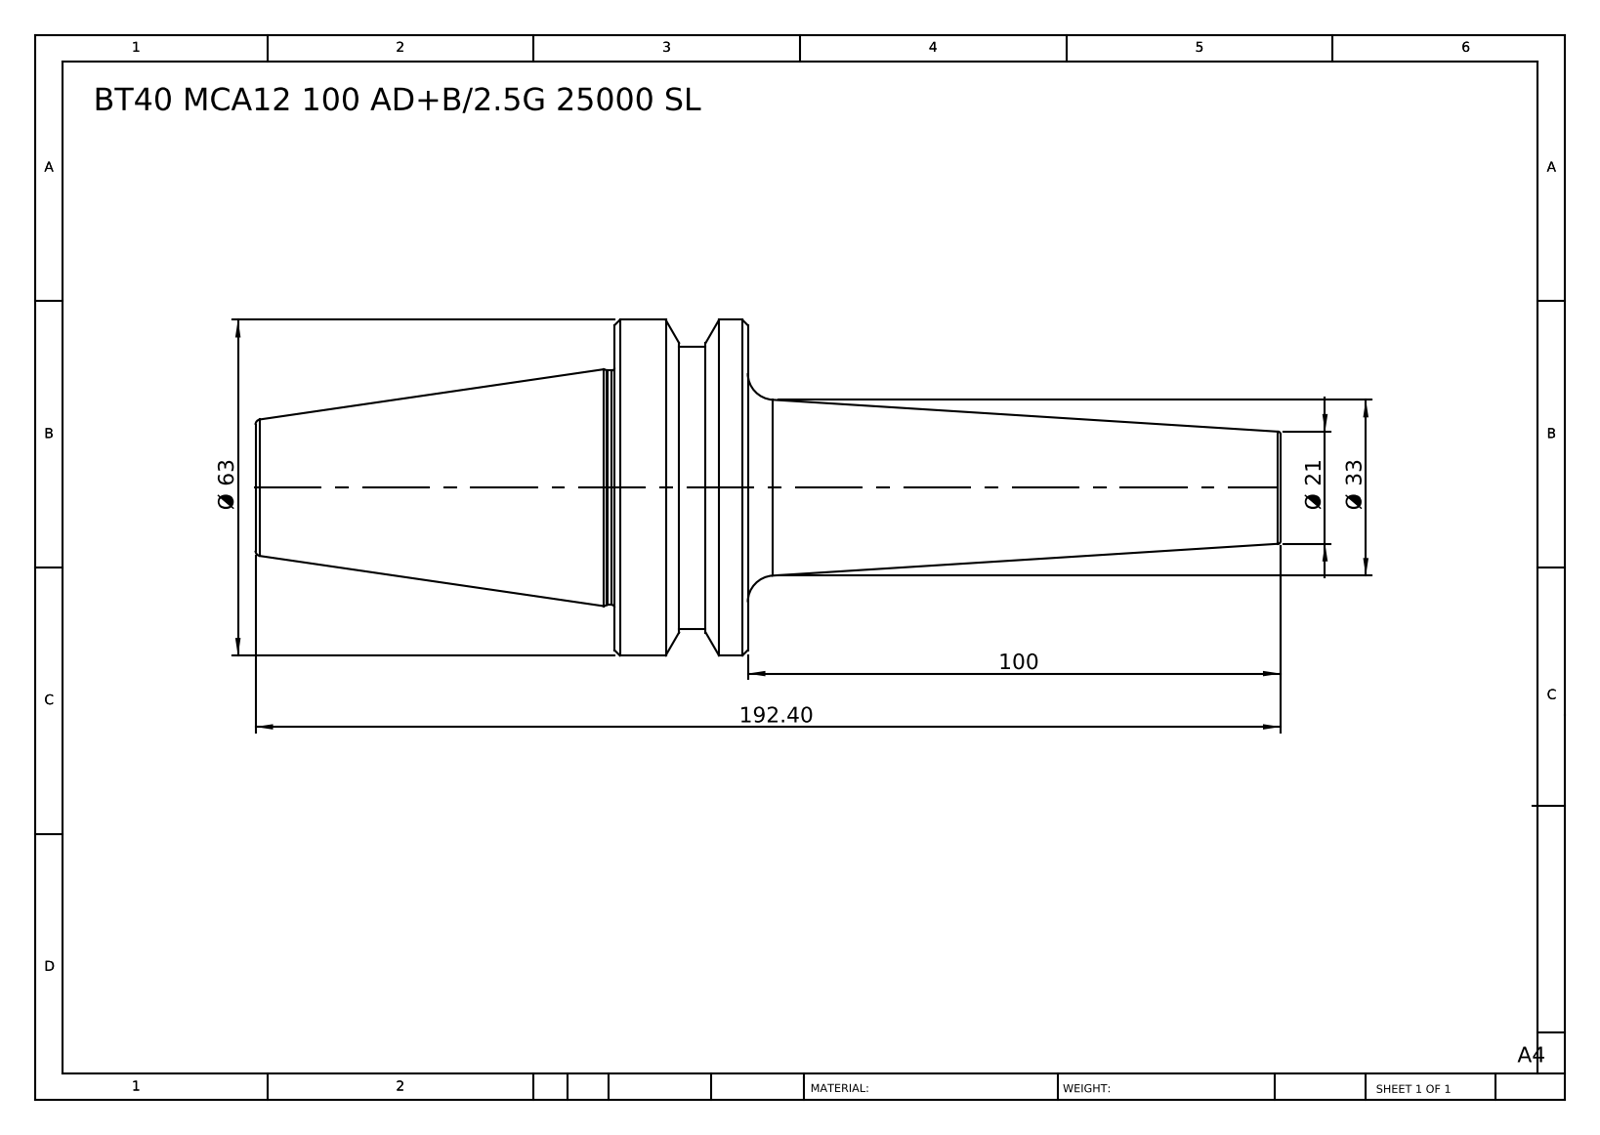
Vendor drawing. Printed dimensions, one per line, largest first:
192.40
100
Ø 63
Ø 33
Ø 21
